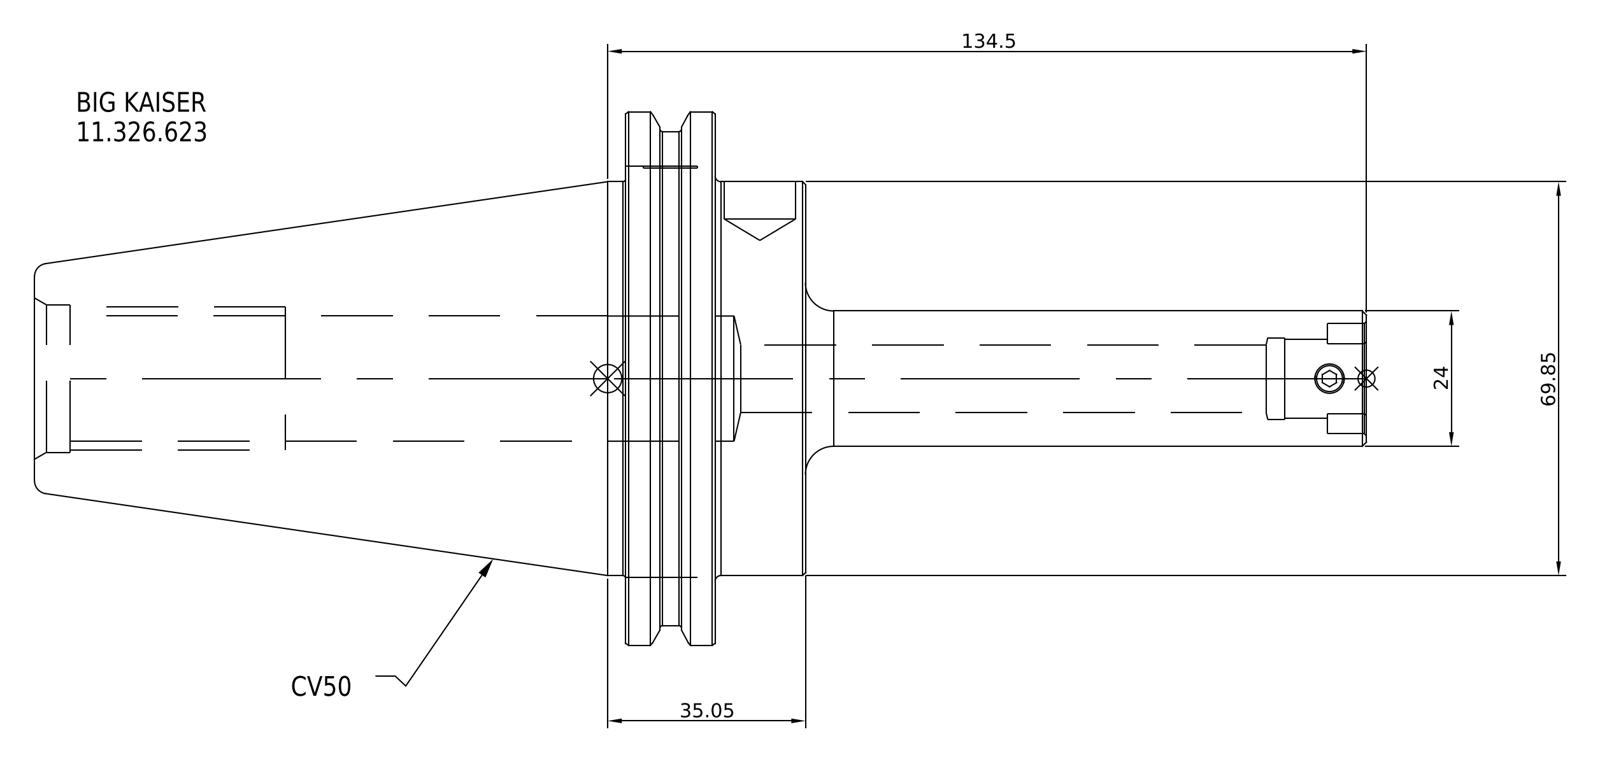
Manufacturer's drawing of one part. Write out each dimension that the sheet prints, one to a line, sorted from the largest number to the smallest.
134.5
69.85
35.05
24
